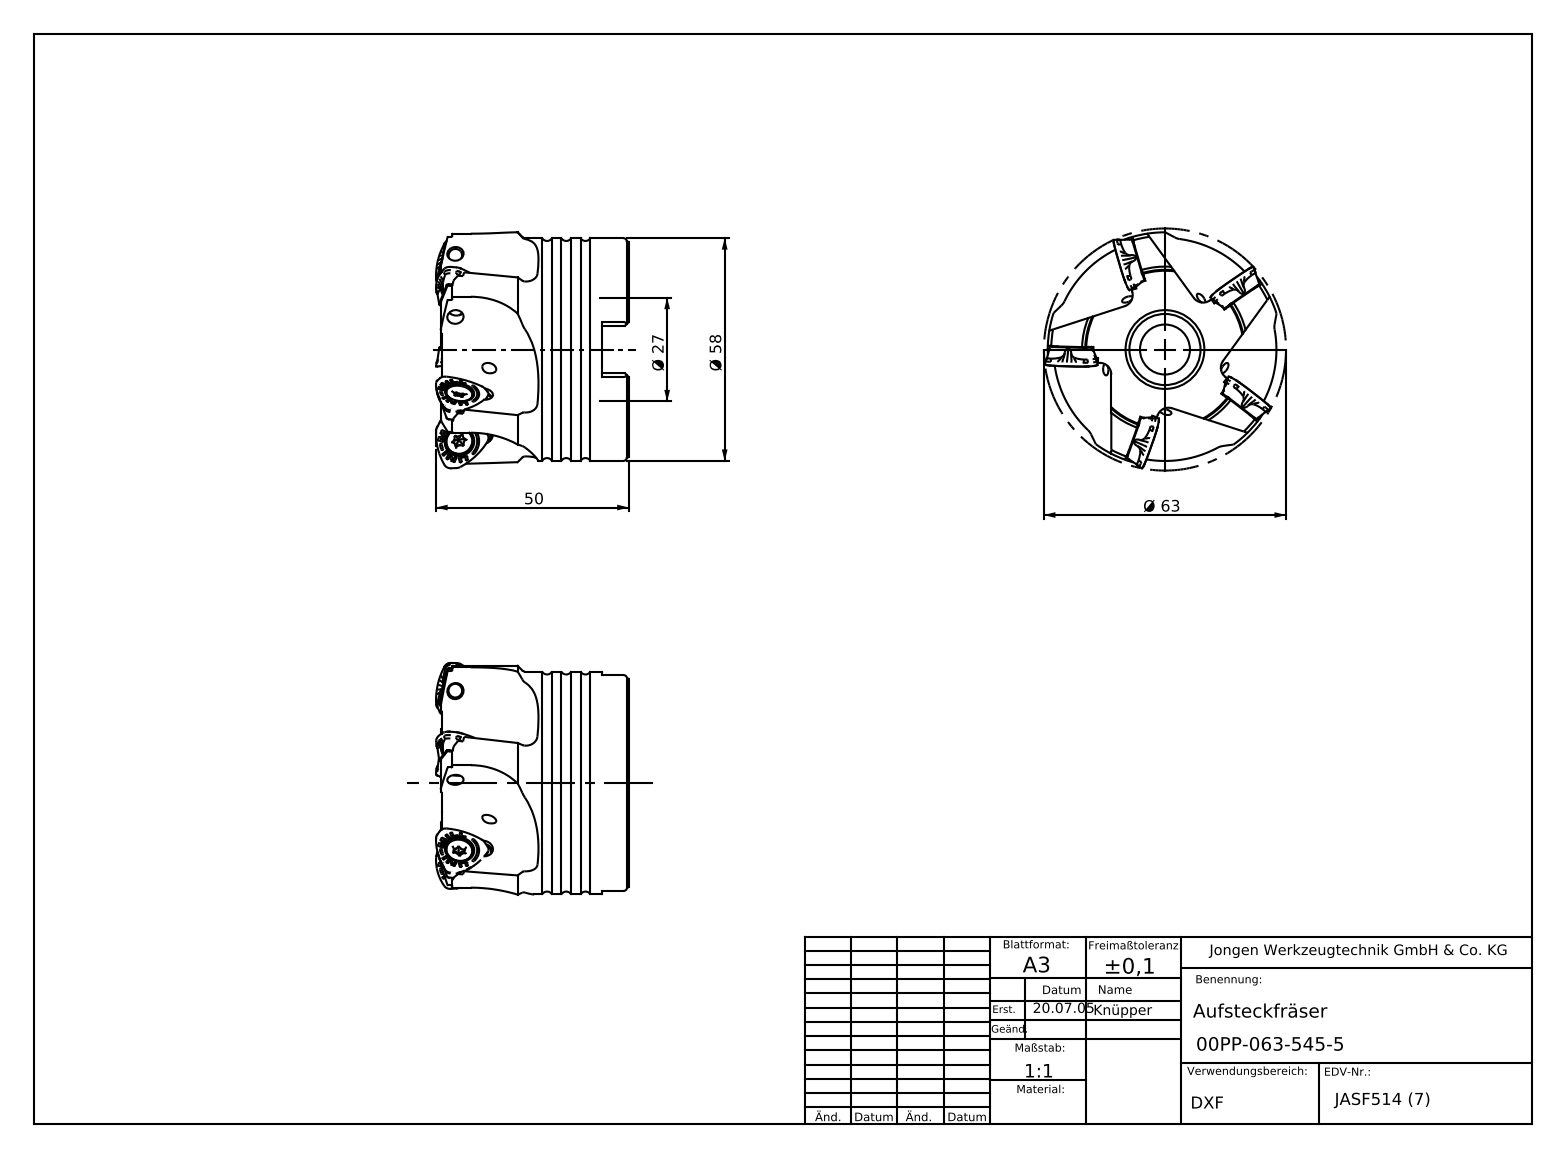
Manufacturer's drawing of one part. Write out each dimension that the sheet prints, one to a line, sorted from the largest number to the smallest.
Ø 63
Ø 58
50
Ø 27
